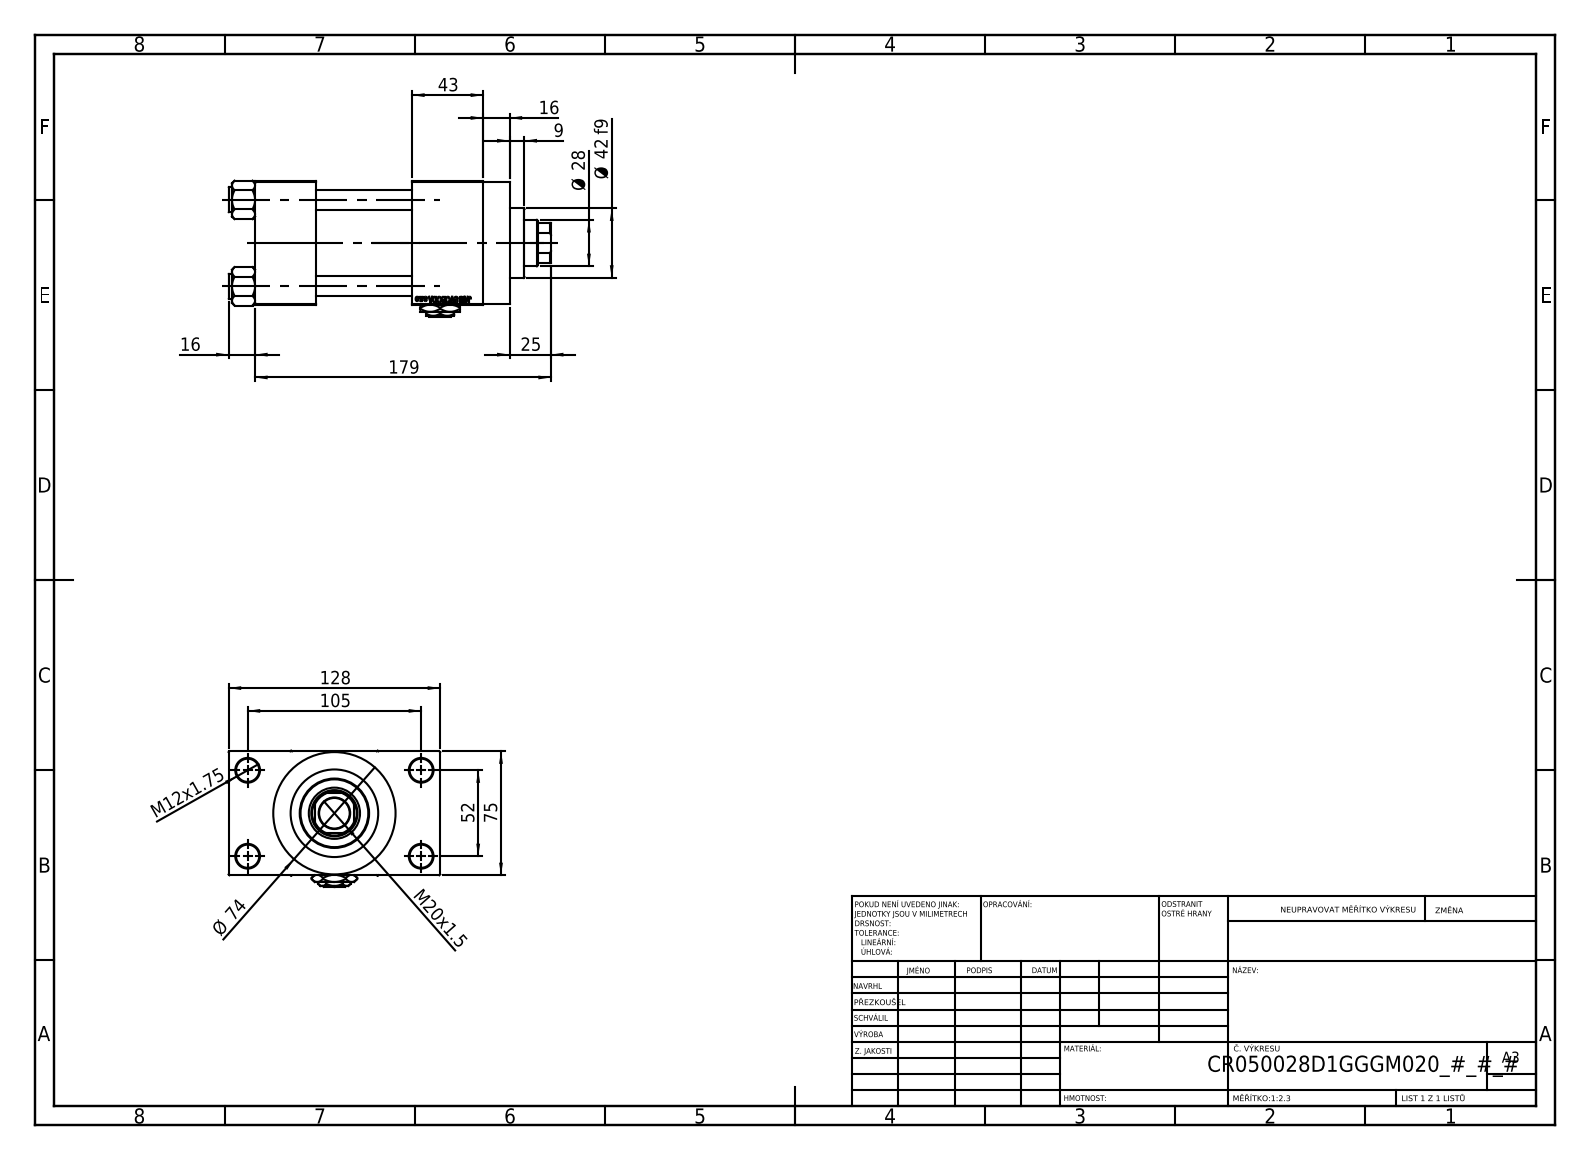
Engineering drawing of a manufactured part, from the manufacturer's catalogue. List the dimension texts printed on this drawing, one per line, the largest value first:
179
128
105
75
Ø 74
52
43
Ø 42 f9
Ø 28
25
M20x1.5
16
16
M12x1.75
9
